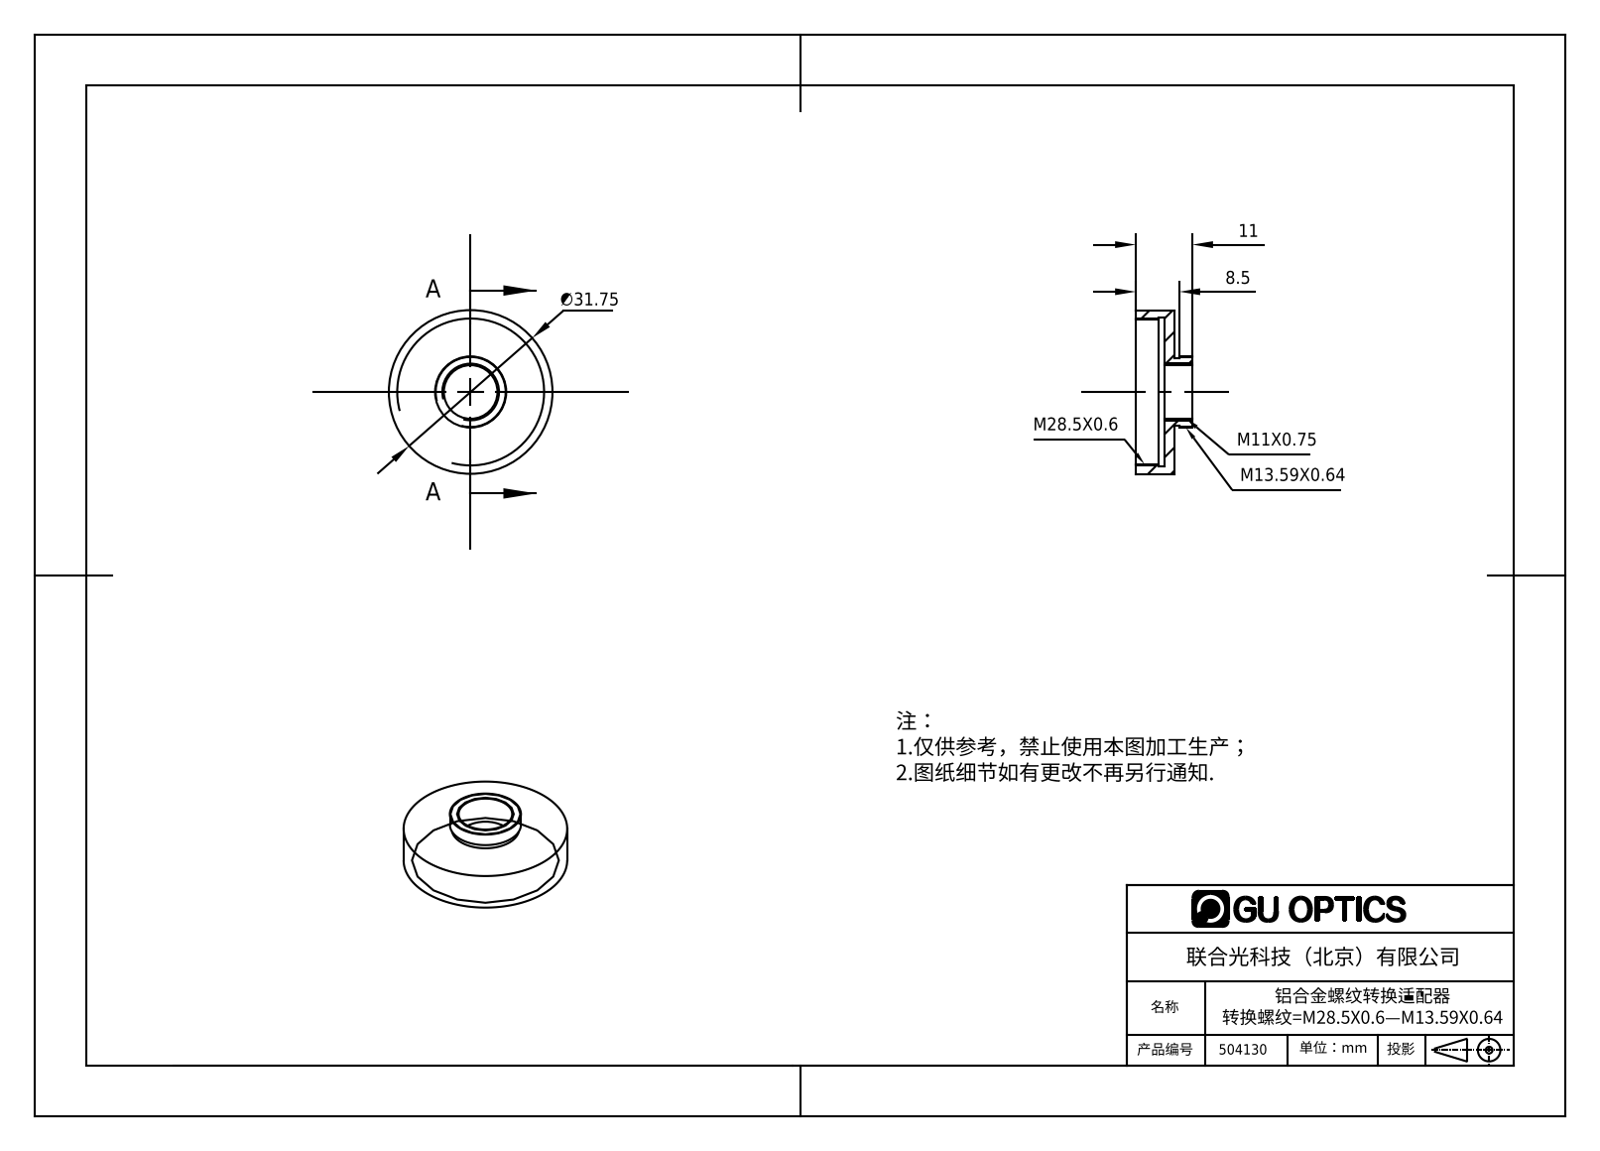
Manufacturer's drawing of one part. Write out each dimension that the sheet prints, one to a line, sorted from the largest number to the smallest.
∅31.75
11
8.5
